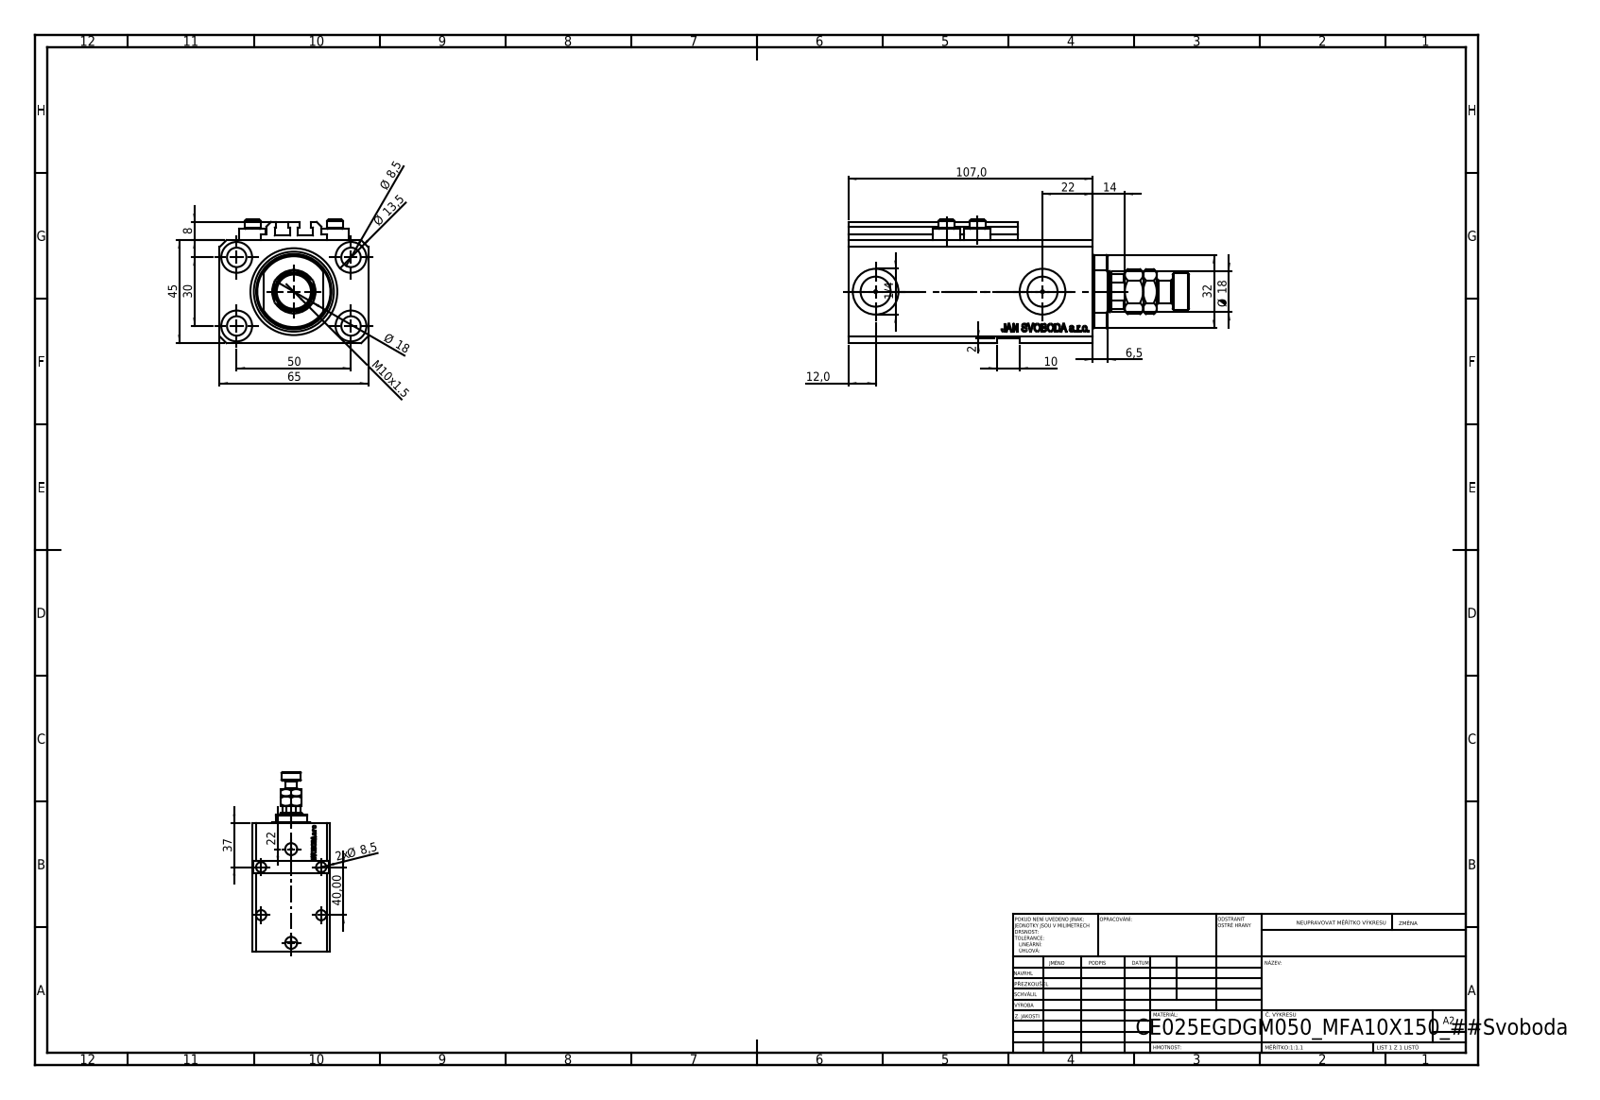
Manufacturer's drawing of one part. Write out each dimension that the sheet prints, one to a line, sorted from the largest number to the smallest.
107,0
65
50
45
40,00
37
32
30
22
22
Ø 18
Ø 18
14
Ø 13,5
12,0
M10x1.5
10
Ø 8,5
2x Ø 8,5
8
6,5
2
1/4
